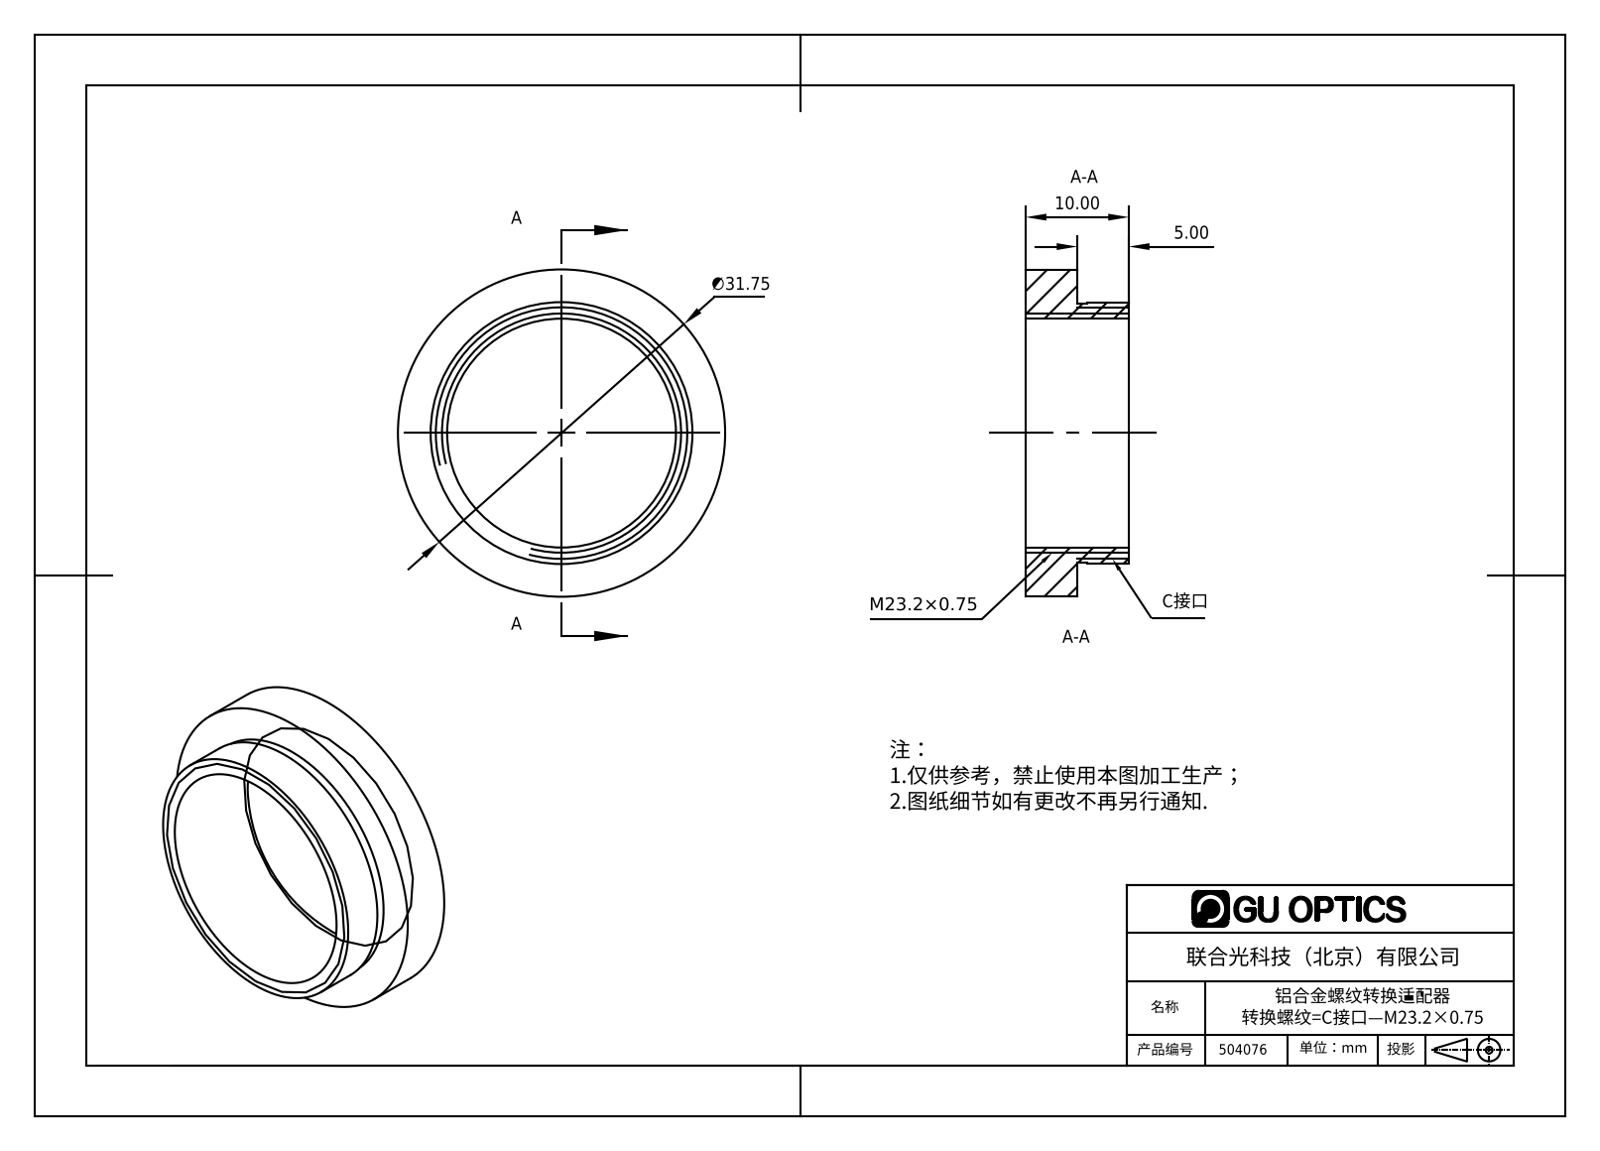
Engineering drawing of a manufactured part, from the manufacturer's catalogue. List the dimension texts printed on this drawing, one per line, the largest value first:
∅31.75
10.00
5.00
